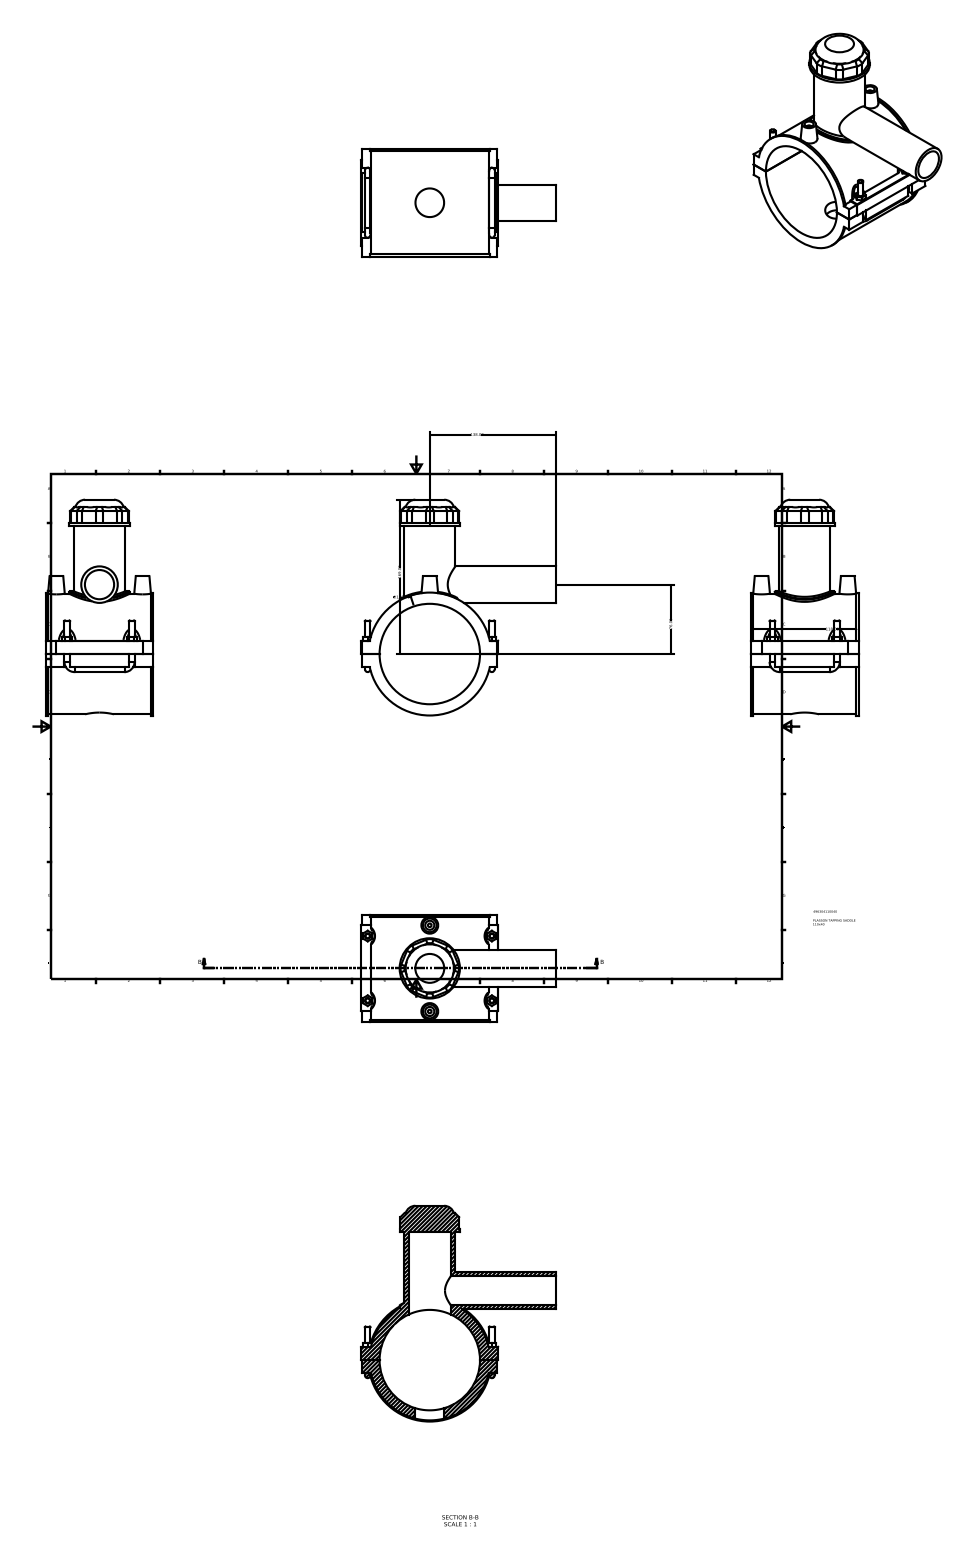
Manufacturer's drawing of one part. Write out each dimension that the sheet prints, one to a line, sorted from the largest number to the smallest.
169.00
138.00
118.00
∅110.00
76.00
